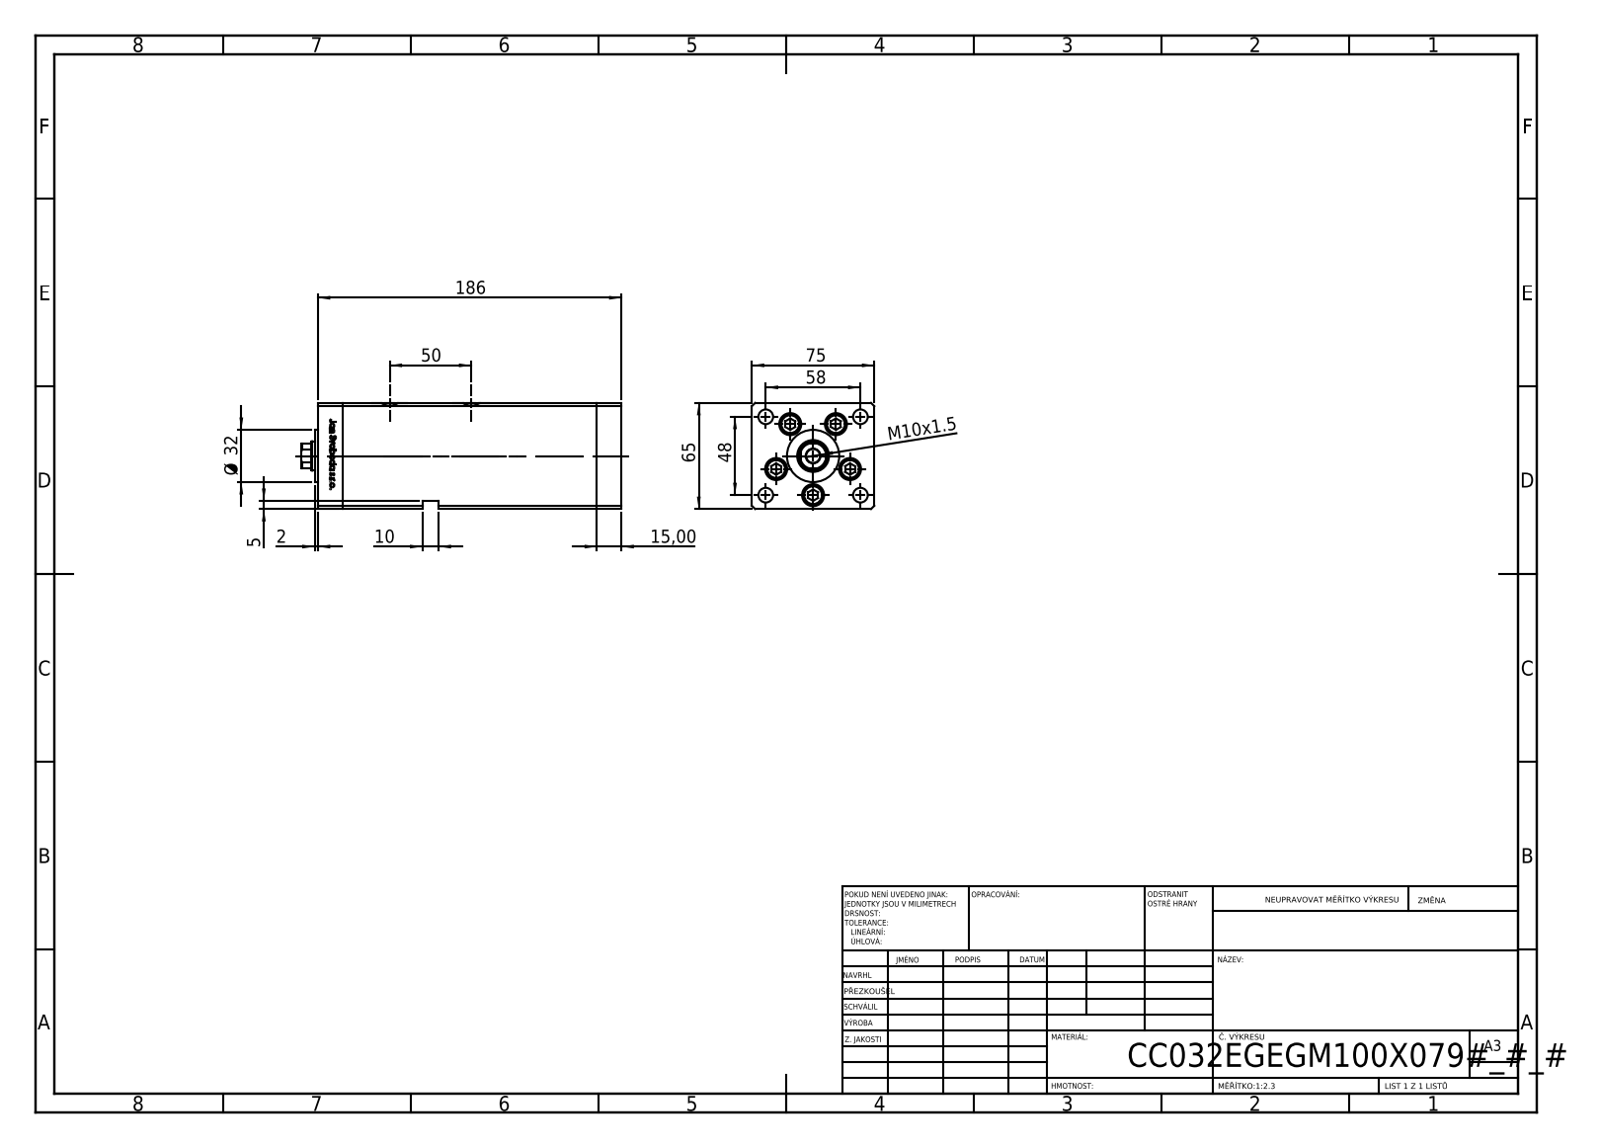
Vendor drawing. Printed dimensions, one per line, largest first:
186
75
65
58
50
48
Ø 32
15,00
10
M10x1.5
5
2
